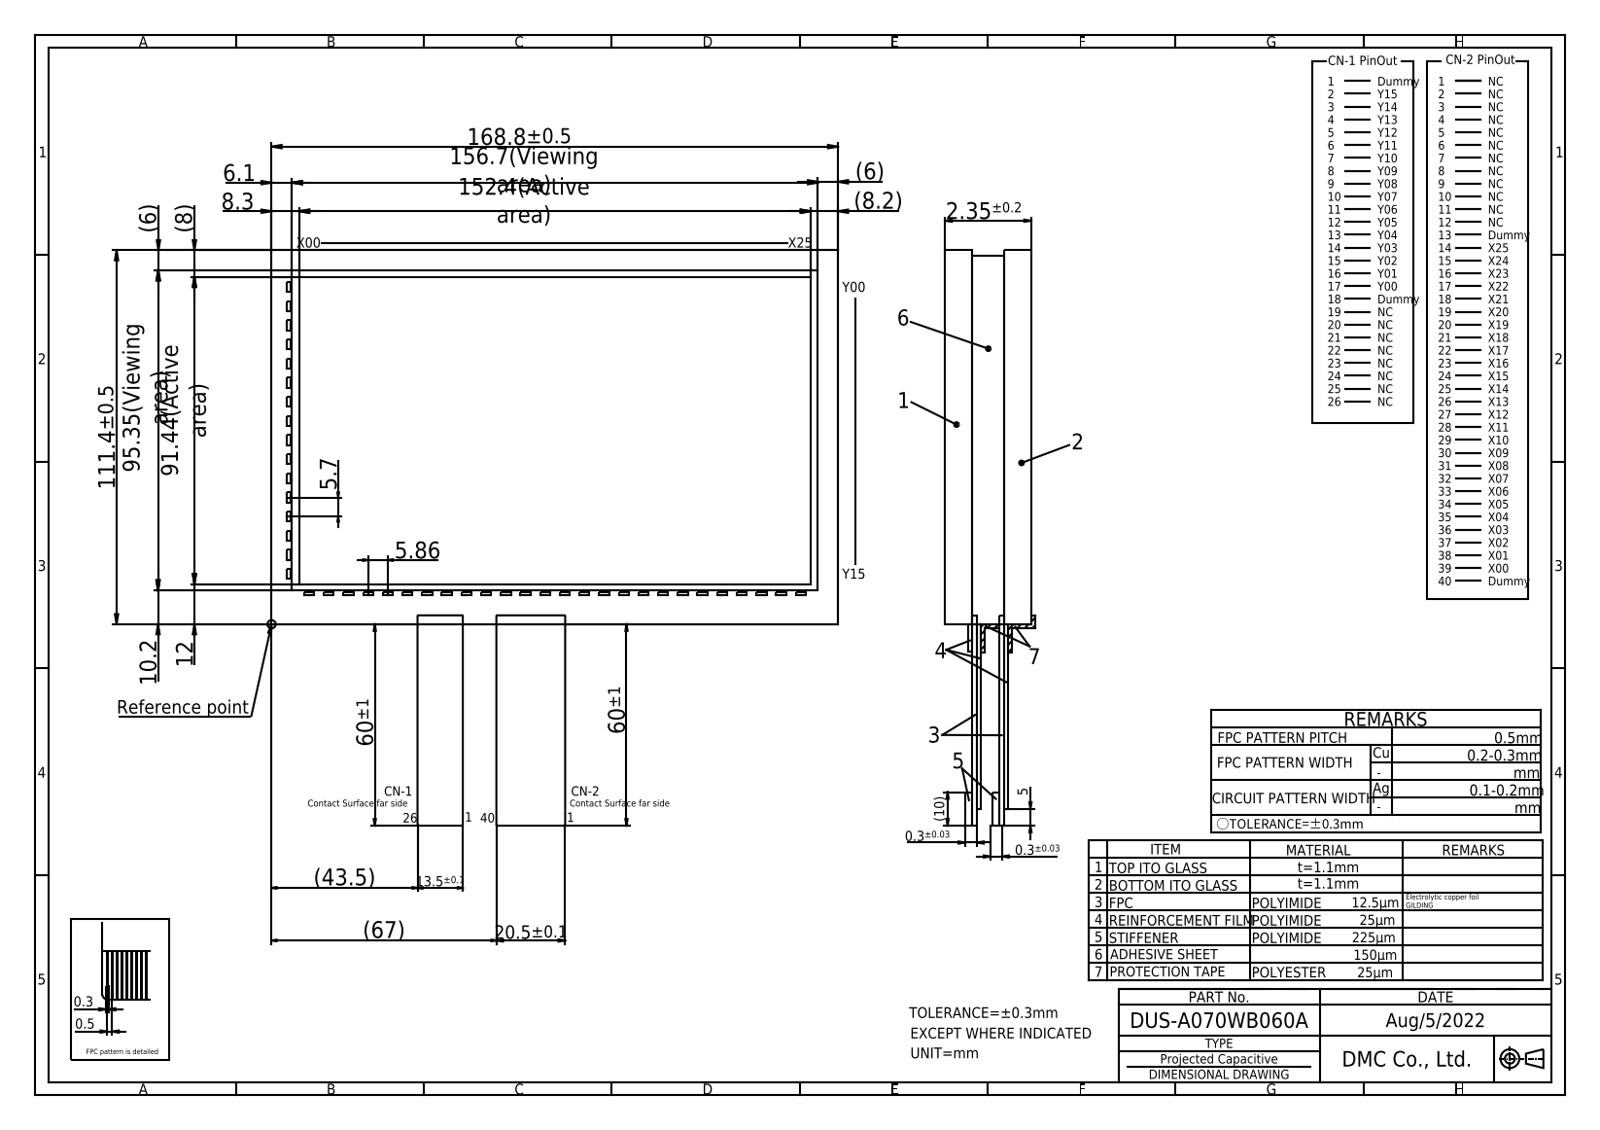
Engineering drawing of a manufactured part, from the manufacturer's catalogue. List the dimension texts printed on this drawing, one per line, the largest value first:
168.8±0.5
156.7(Viewing area)
152.4(Active area)
111.4±0.5
95.35(Viewing area)
91.44(Active area)
(67)
60±1
60±1
(43.5)
20.5±0.1
13.5±0.1
12
10.2
(10)
8.3
(8.2)
(8)
6.1
(6)
(6)
5.86
5.7
5
2.35±0.2
0.5
0.3±0.03
0.3±0.03
0.3
